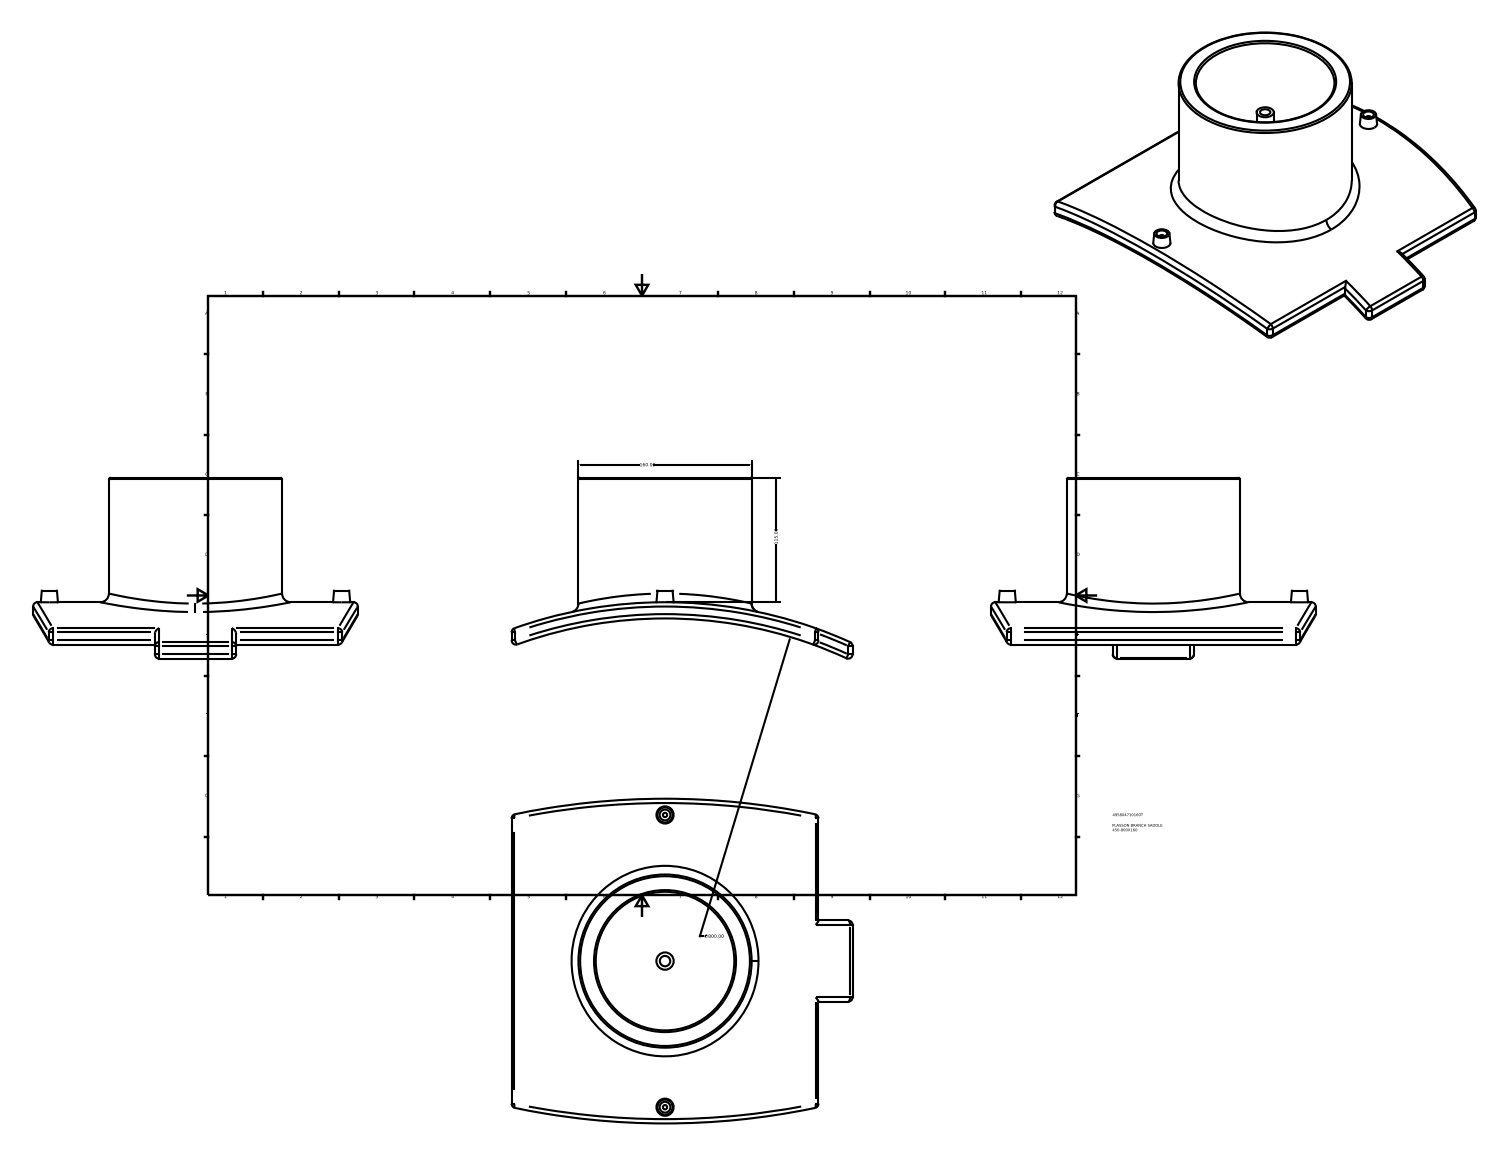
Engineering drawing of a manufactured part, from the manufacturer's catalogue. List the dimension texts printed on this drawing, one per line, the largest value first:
∅800.00
160.00
115.00
